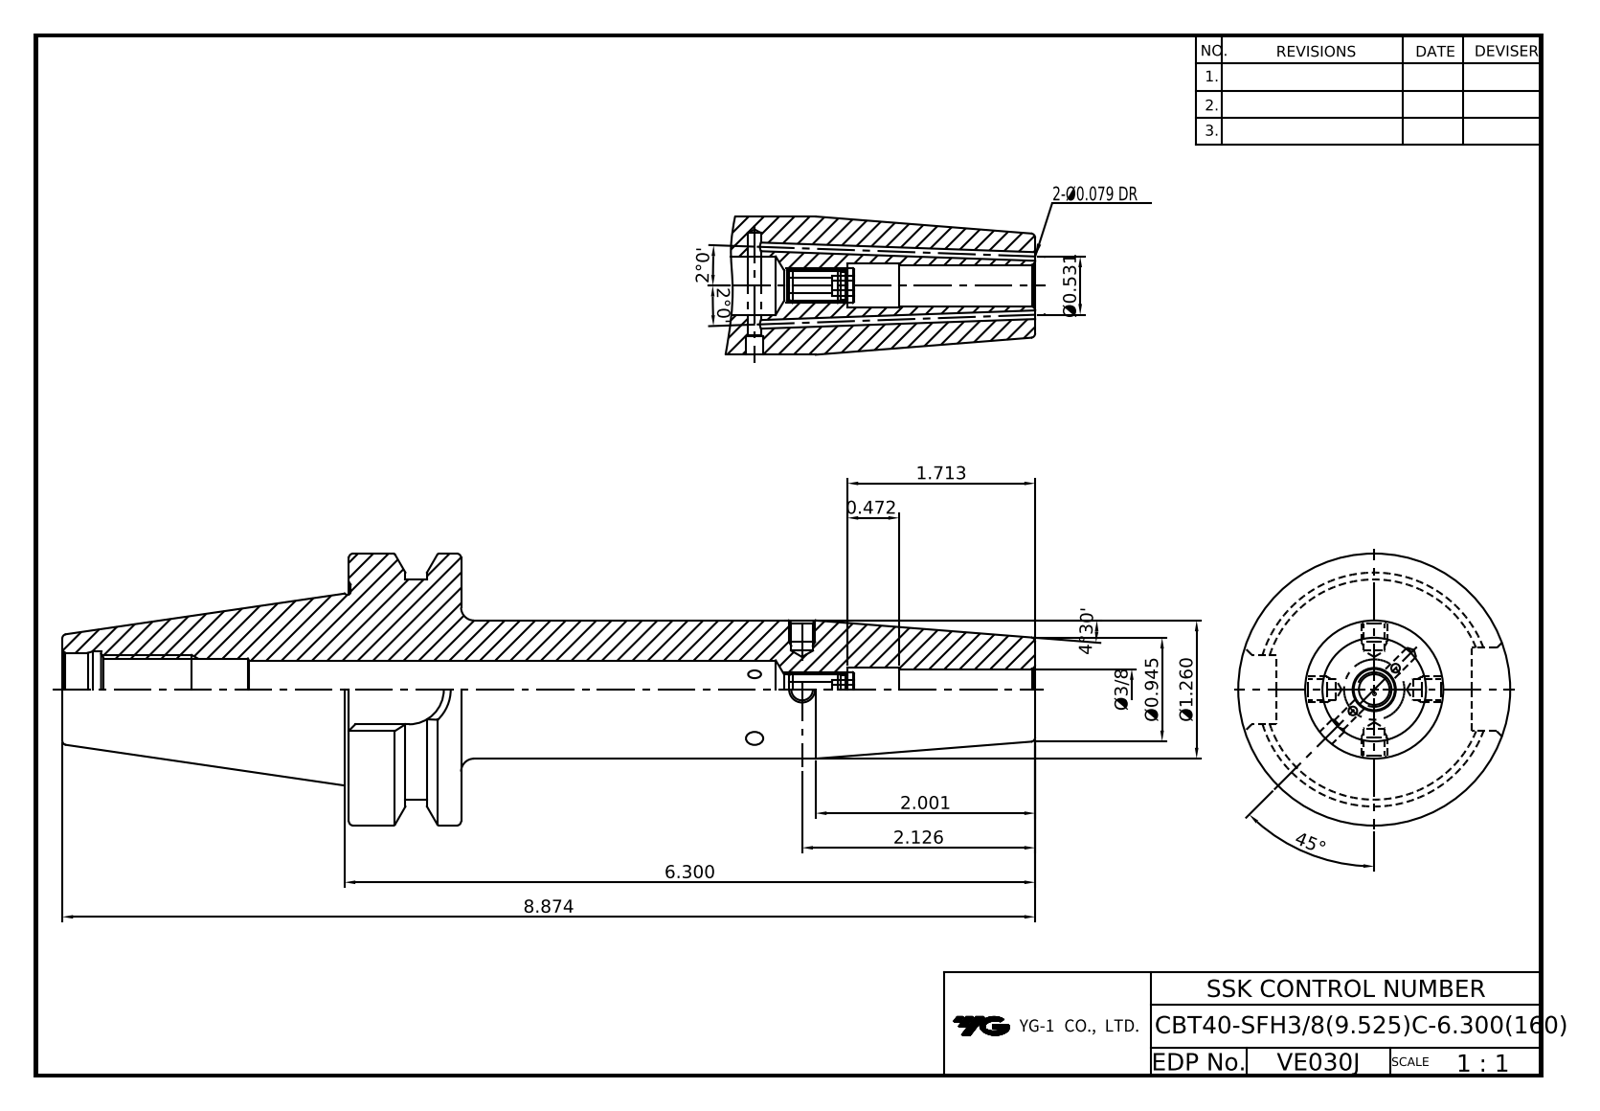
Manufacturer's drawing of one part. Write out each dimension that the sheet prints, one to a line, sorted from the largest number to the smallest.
45°
8.874
6.300
4°30'
2.126
2.001
2°0'
2°0'
1.713
Ø1.260
Ø0.945
Ø0.531
0.472
